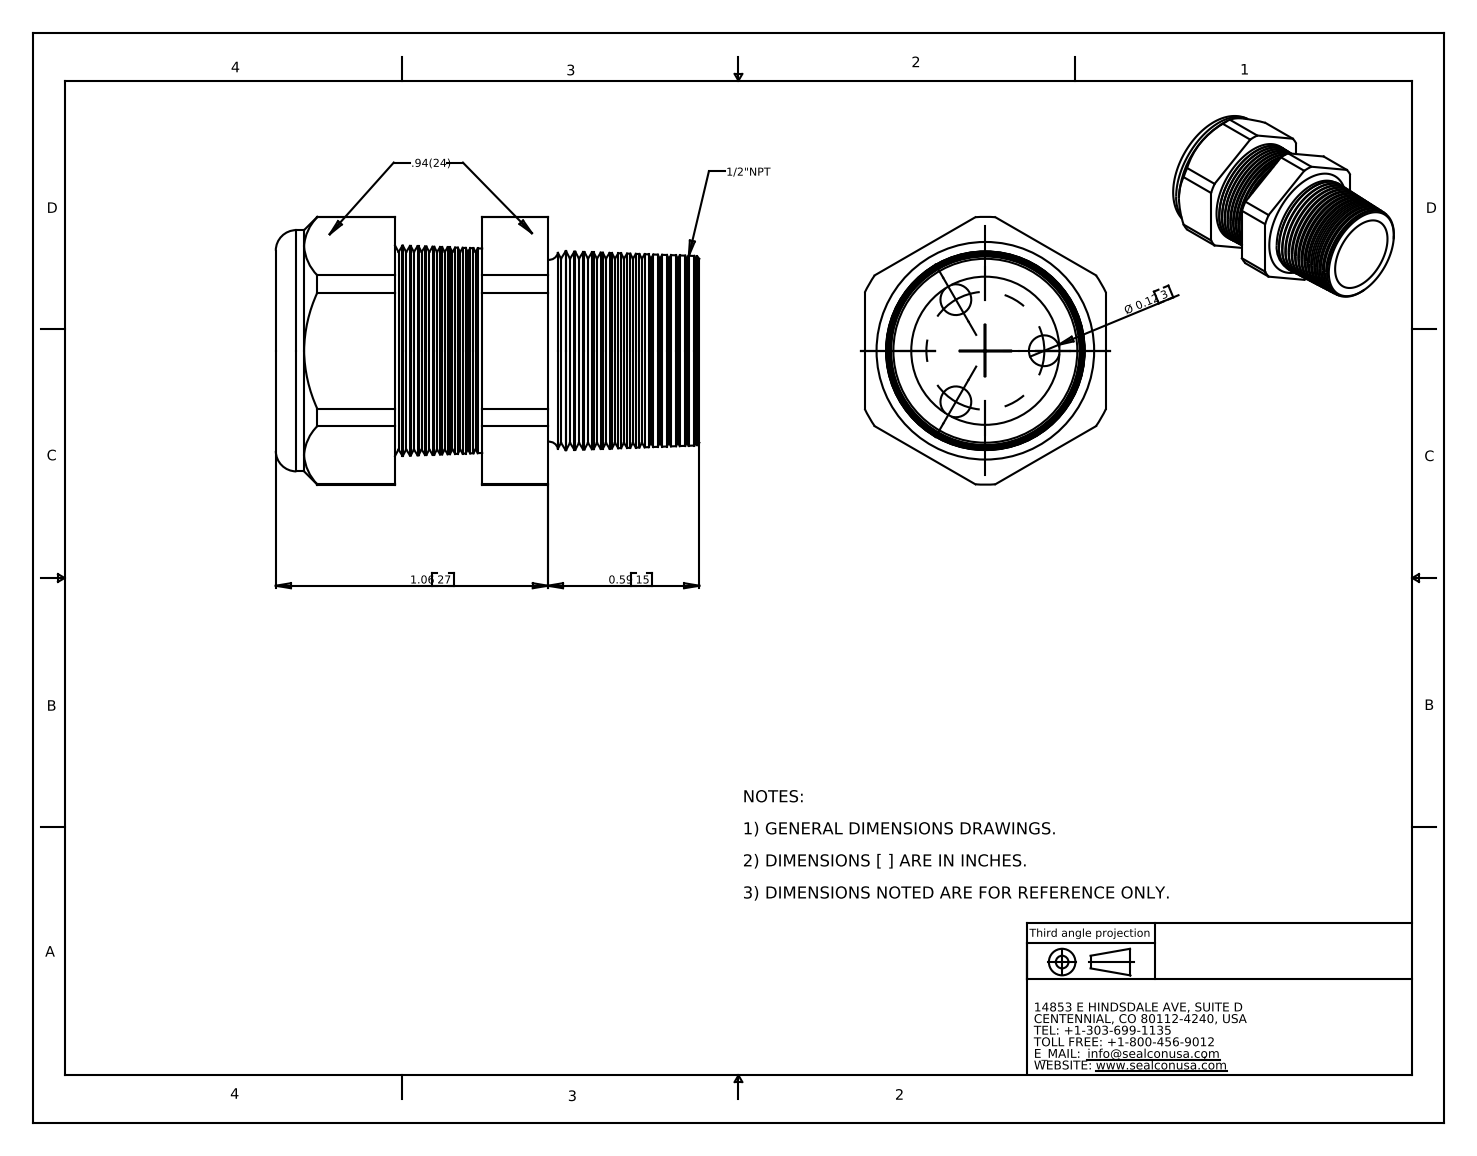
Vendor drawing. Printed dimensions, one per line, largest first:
1.06 27
0.59 15
Ø 0.12 3
